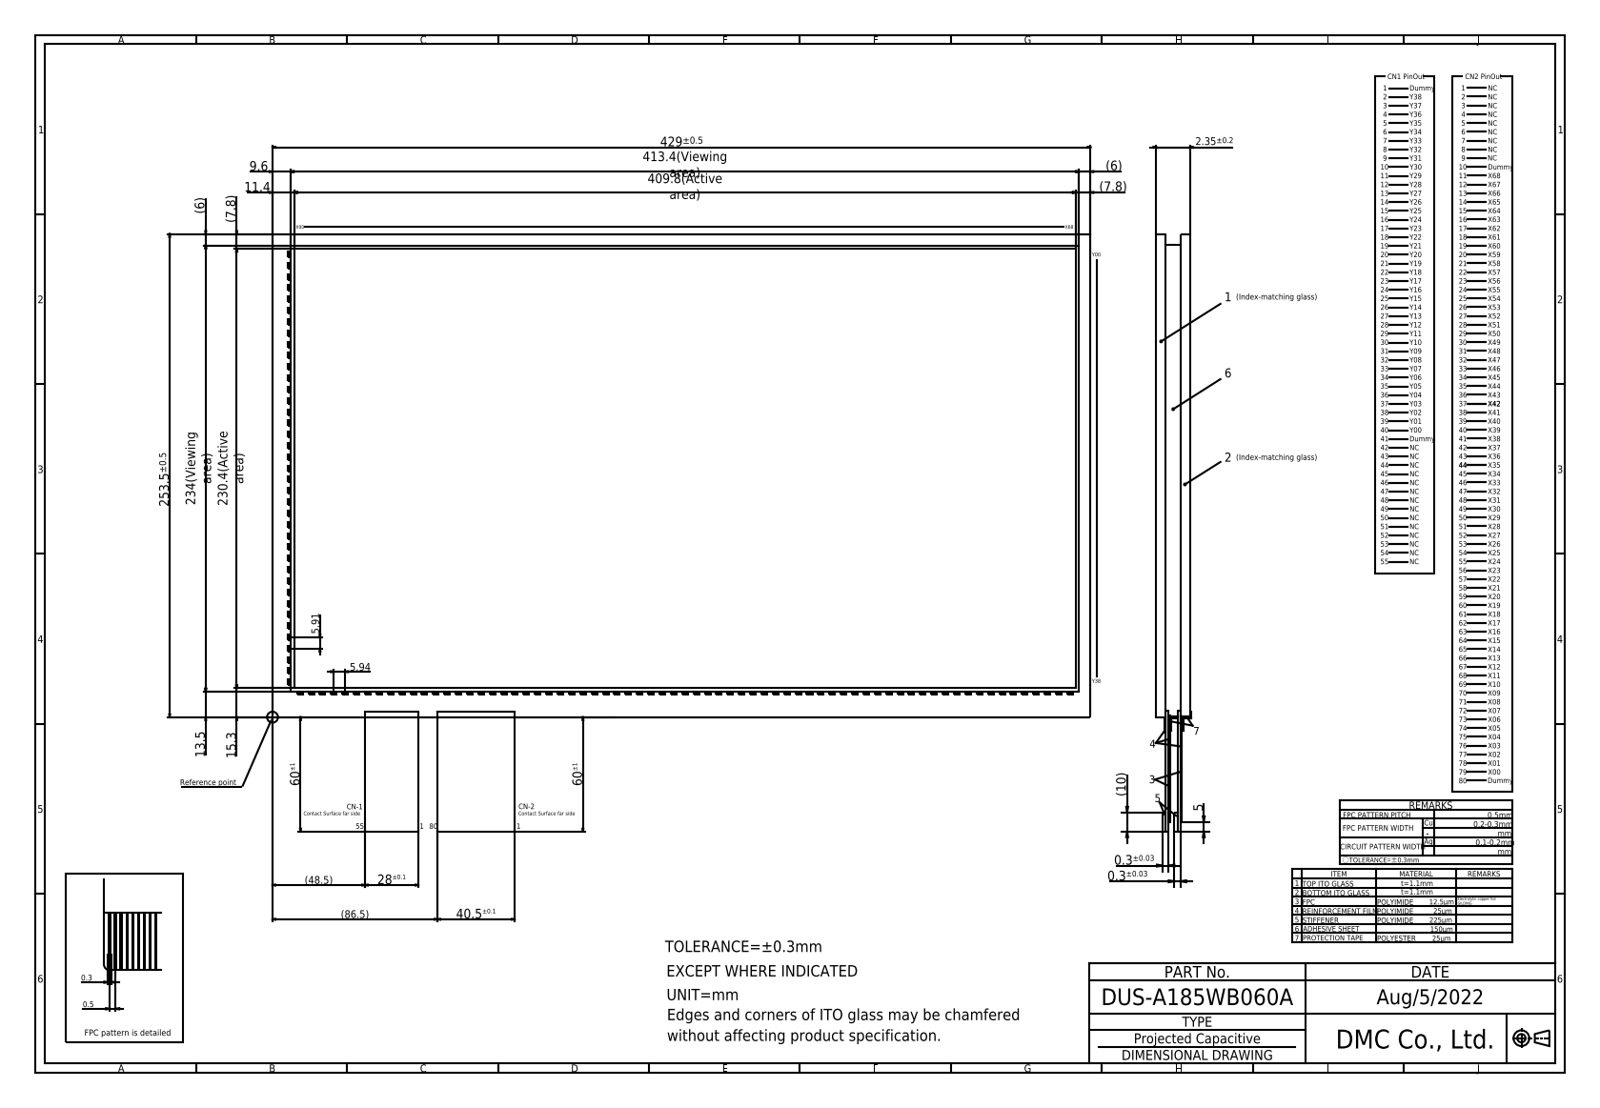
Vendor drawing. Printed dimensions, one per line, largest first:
429±0.5
413.4(Viewing area)
409.8(Active area)
253.5±0.5
234(Viewing area)
230.4(Active area)
(86.5)
60±1
60±1
(48.5)
40.5±0.1
28±0.1
15.3
13.5
11.4
(10)
9.6
(7.8)
(7.8)
(6)
(6)
5.94
5.91
5
2.35±0.2
0.5
0.3
0.3±0.03
0.3±0.03
